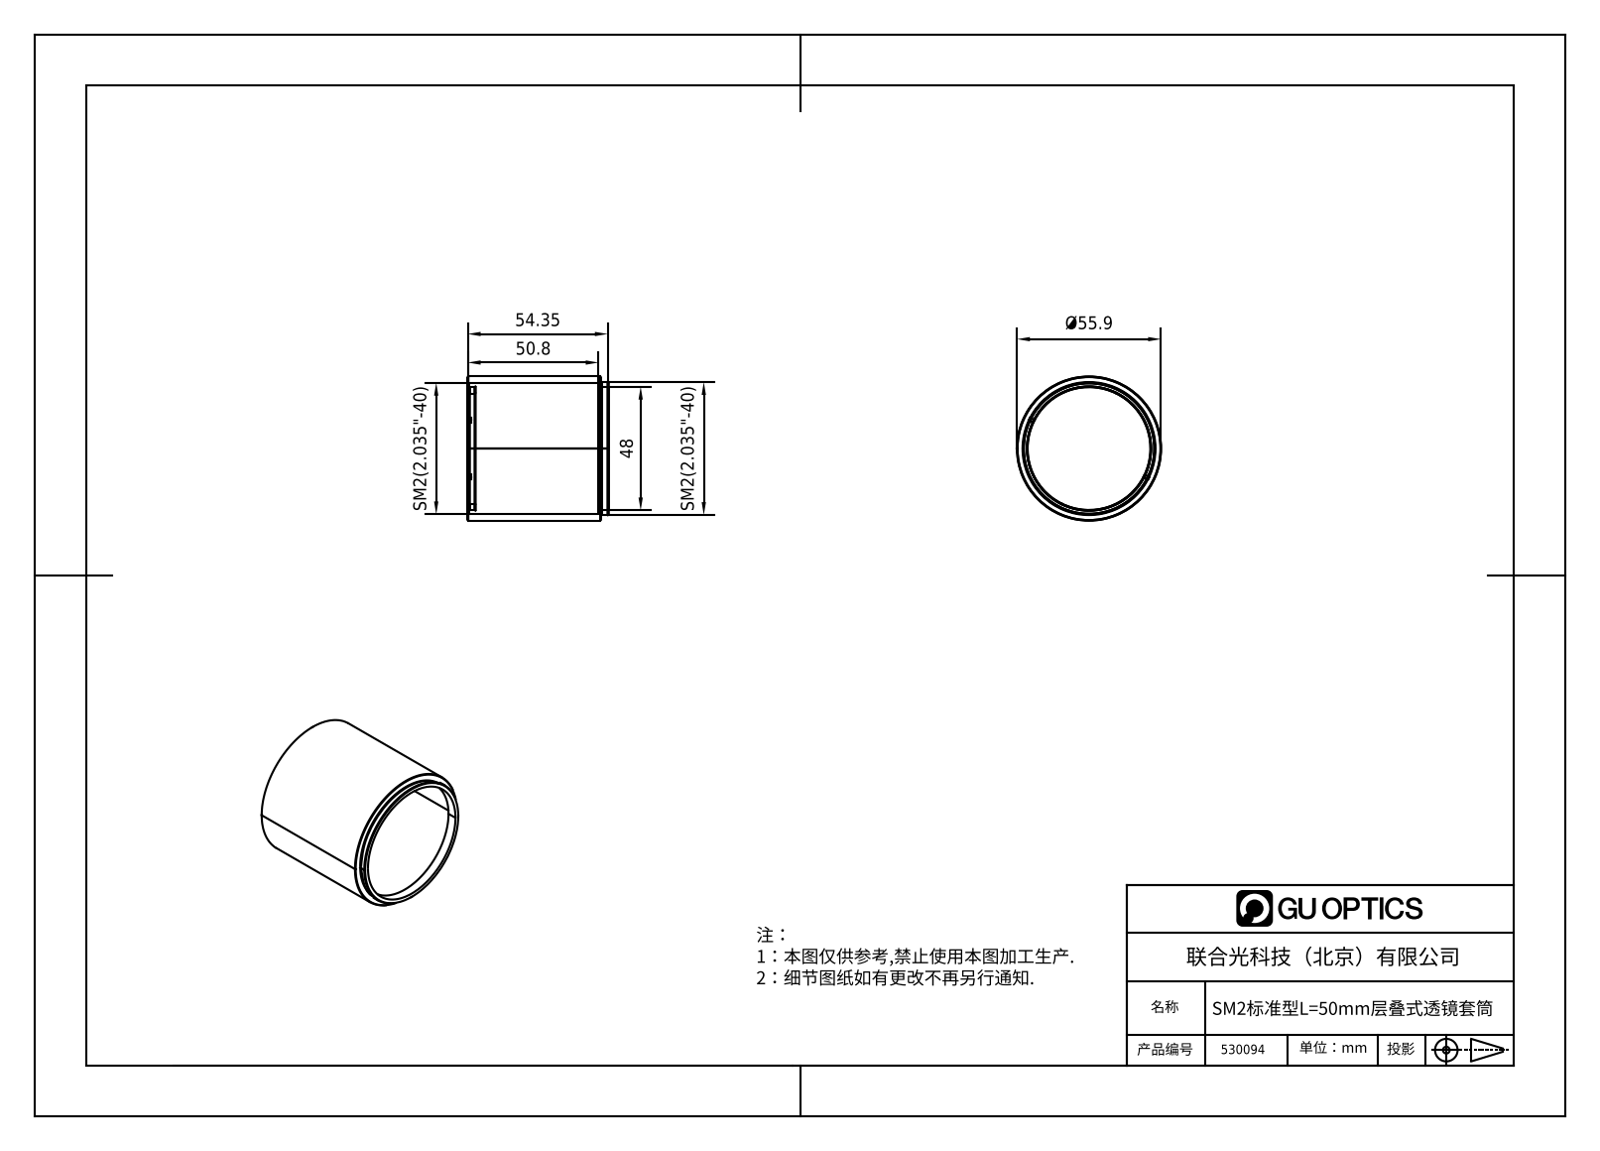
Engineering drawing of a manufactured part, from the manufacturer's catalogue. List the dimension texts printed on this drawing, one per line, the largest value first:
Ø55.9
54.35
50.8
48
SM2(2.035"-40)
SM2(2.035"-40)
